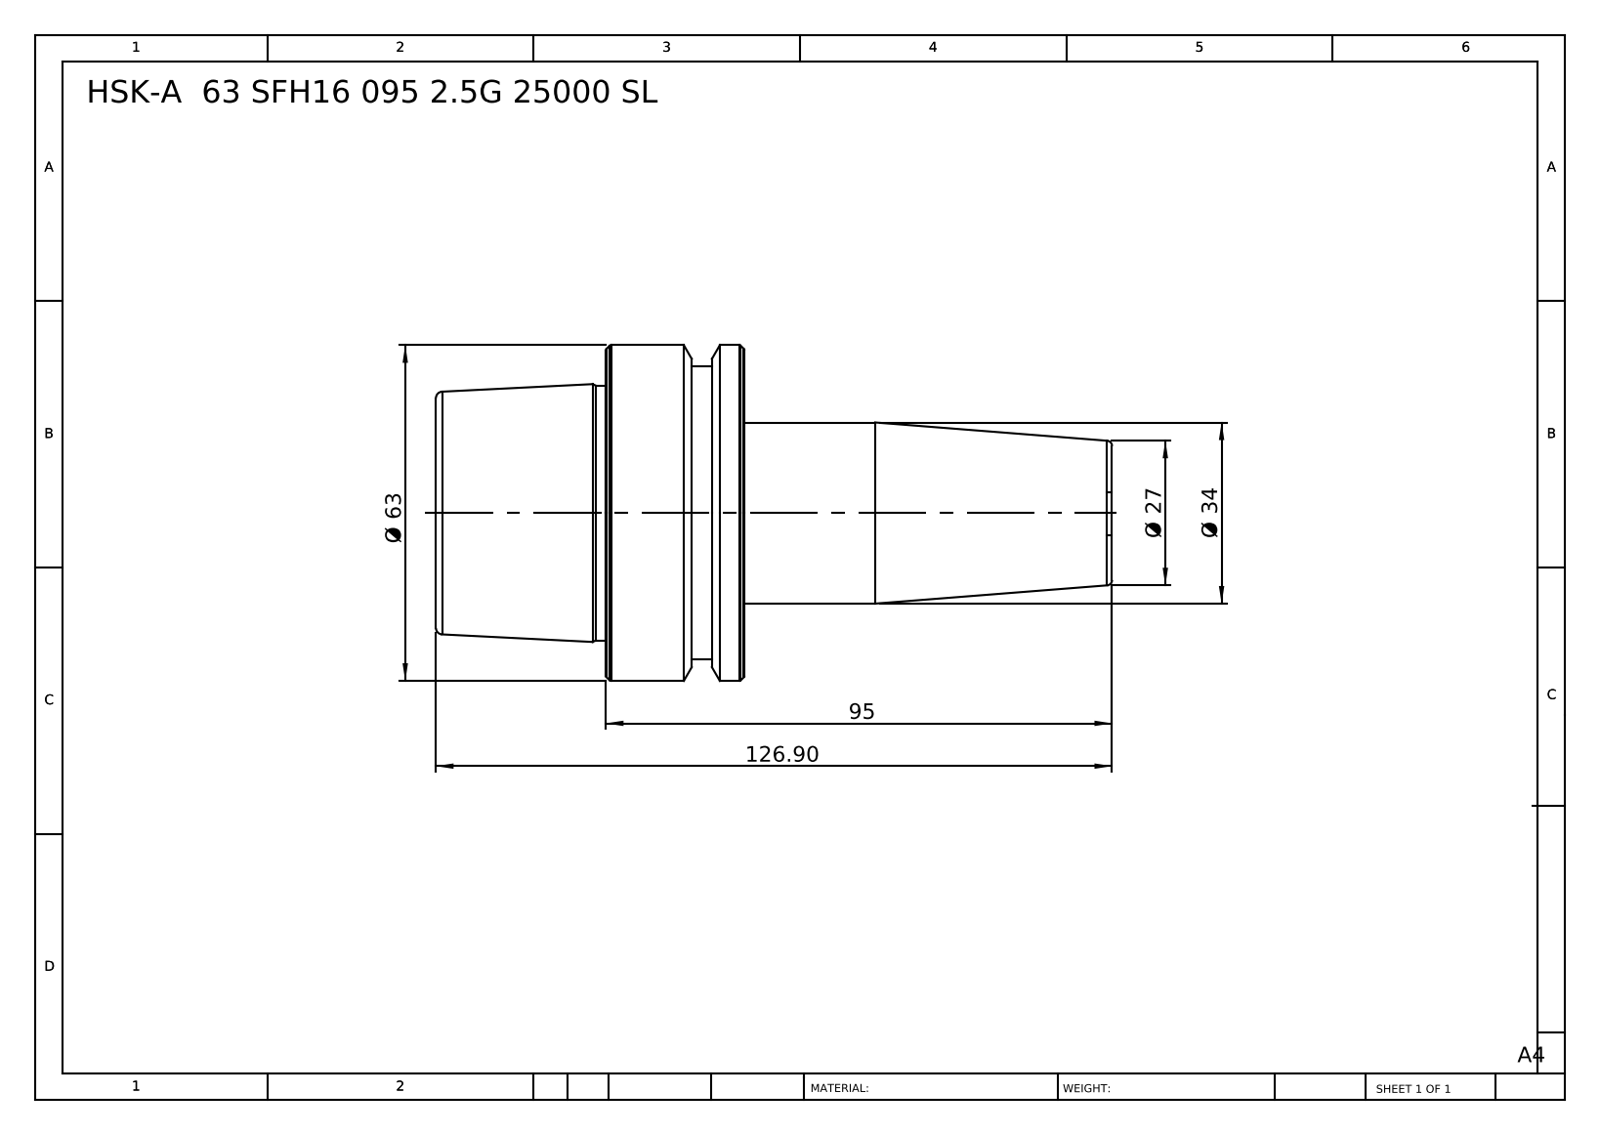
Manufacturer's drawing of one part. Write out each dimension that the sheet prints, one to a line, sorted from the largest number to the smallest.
126.90
95
Ø 63
Ø 34
Ø 27
